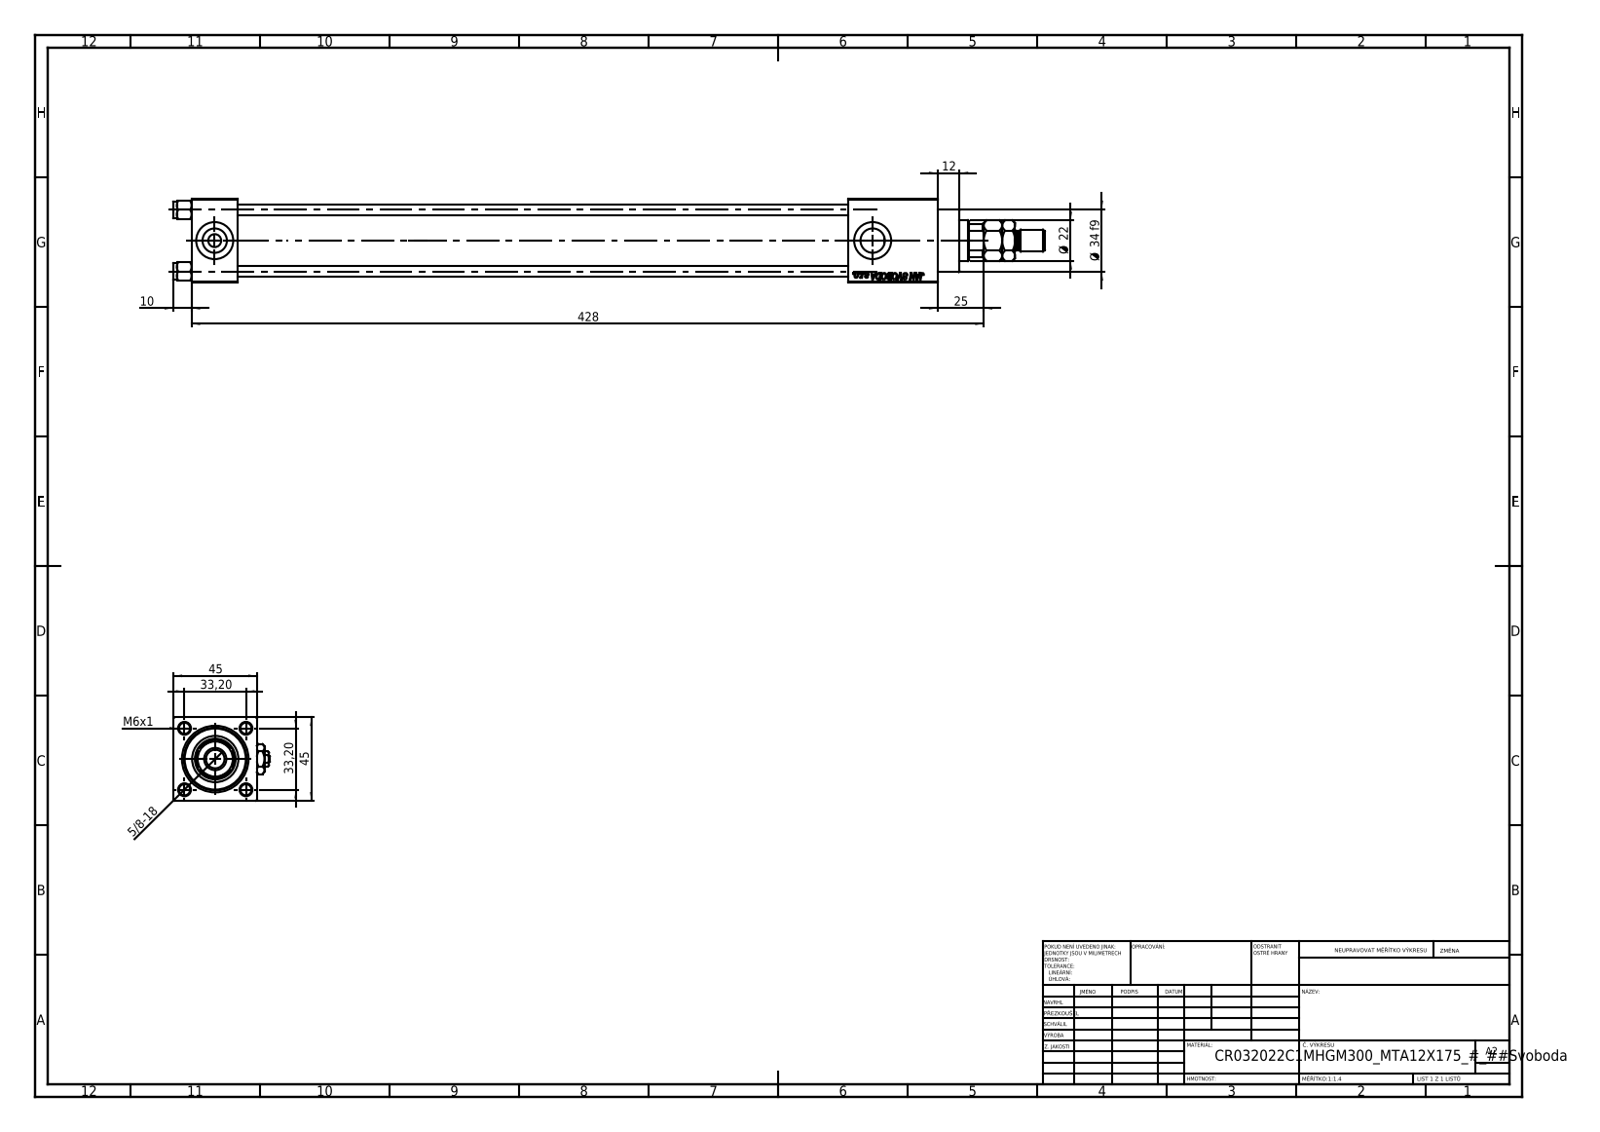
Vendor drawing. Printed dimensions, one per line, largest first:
428
45
45
Ø 34 f9
33,20
33,20
25
Ø 22
12
10
M6x1
5/8-18
